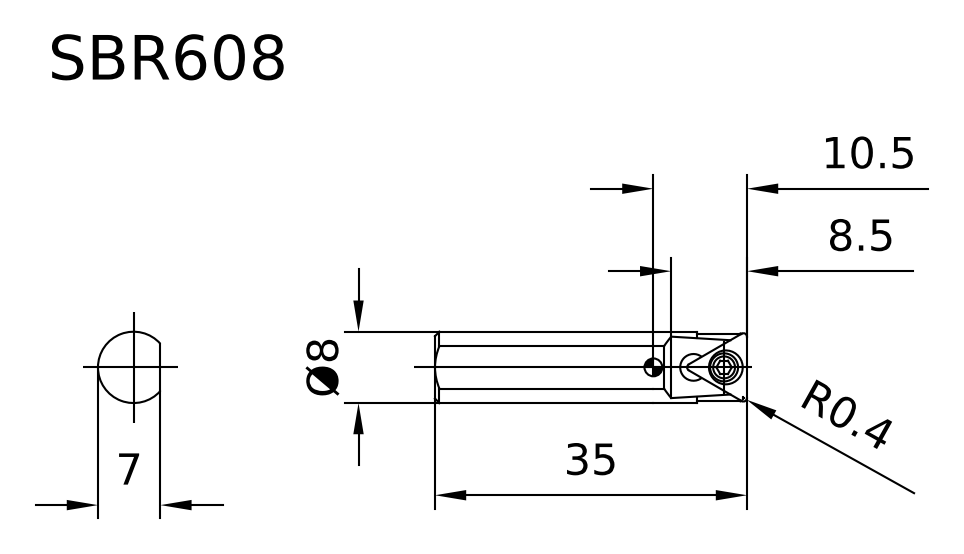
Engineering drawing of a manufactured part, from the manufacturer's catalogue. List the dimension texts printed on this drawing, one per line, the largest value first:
35
10.5
8.5
Ø8
7
R0.4
